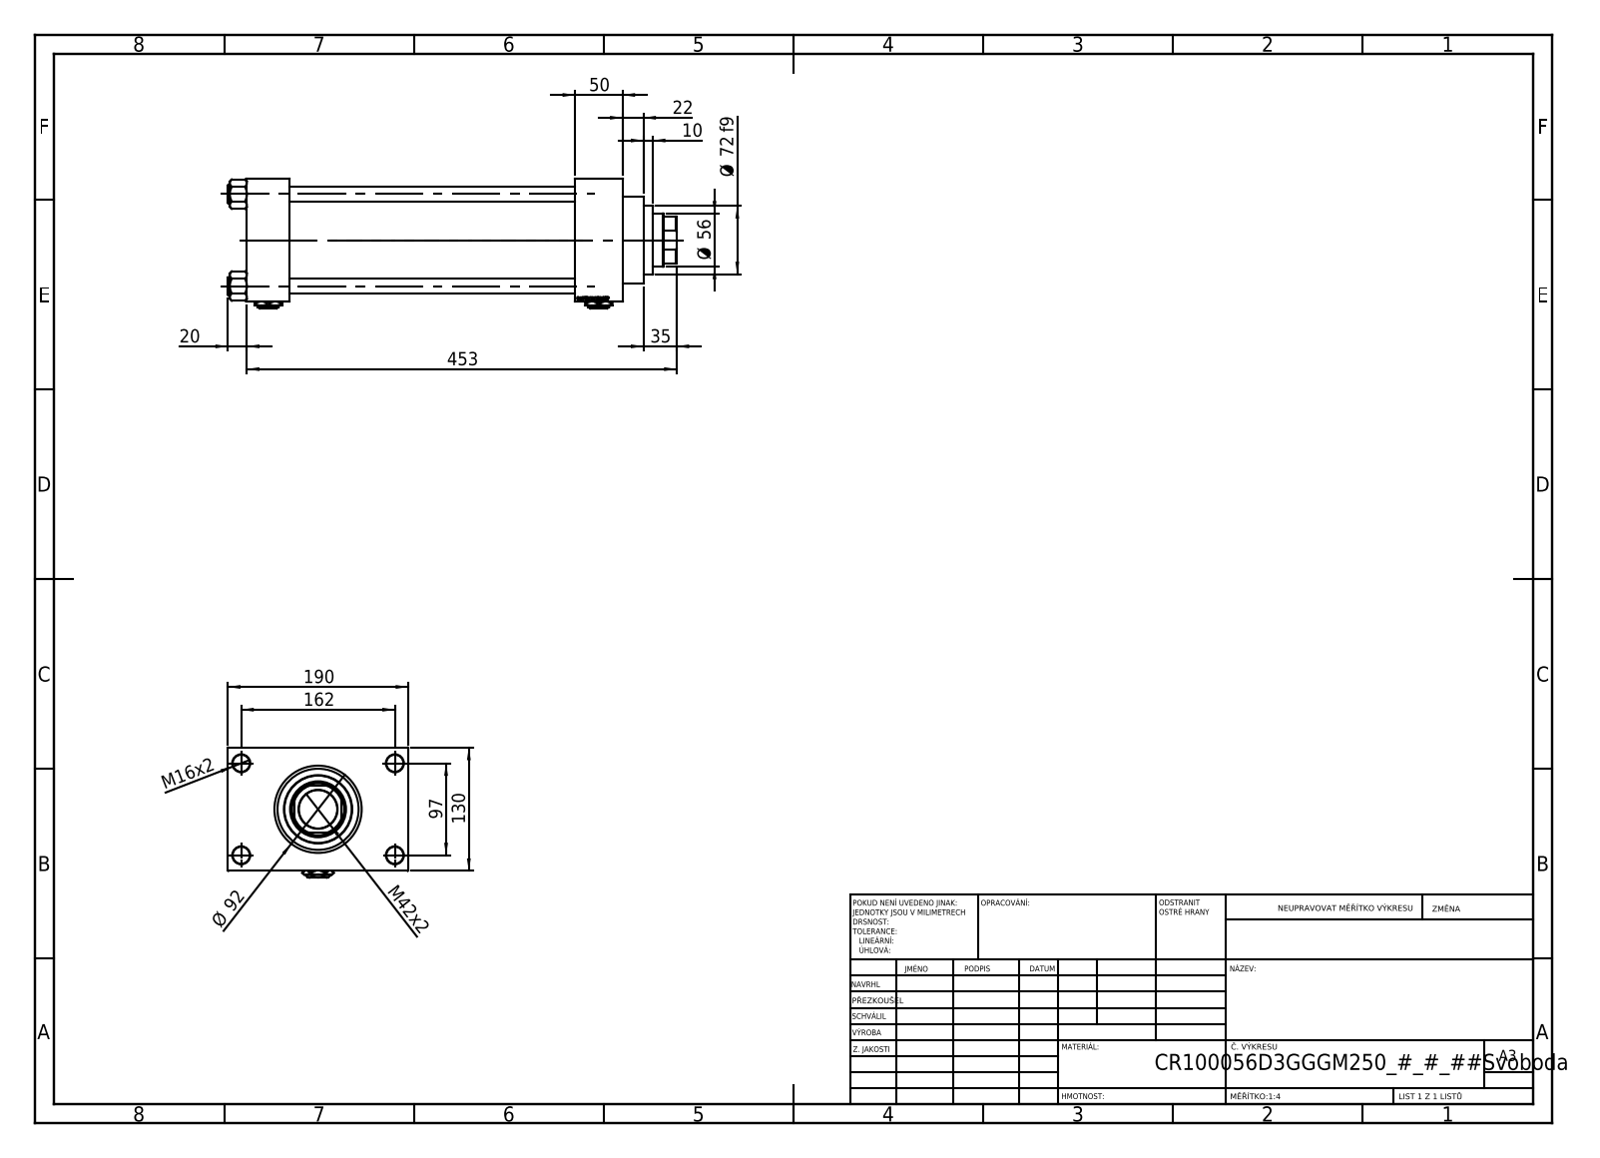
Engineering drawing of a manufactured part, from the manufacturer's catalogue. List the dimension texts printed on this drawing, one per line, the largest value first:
453
190
162
130
97
Ø 92
Ø 72 f9
Ø 56
50
M42x2
35
22
20
M16x2
10
